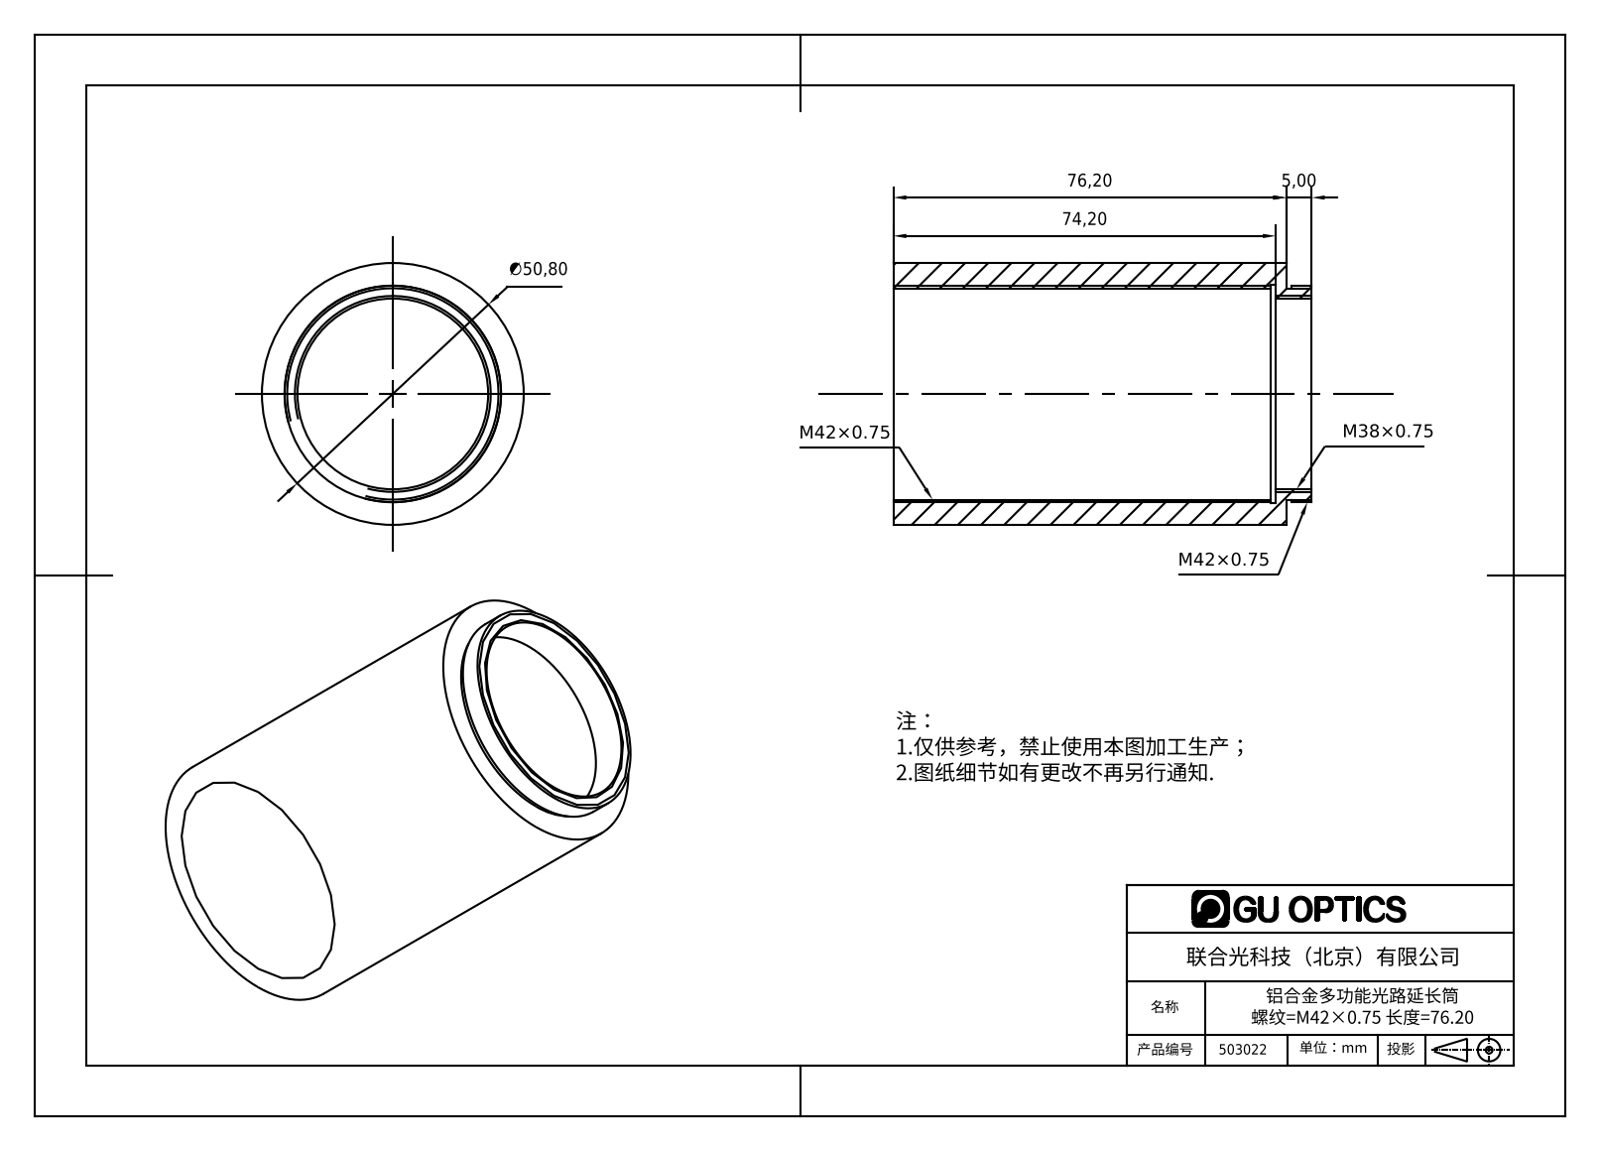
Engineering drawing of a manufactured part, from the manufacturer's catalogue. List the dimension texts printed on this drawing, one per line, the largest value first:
76,20
74,20
∅50,80
5,00
